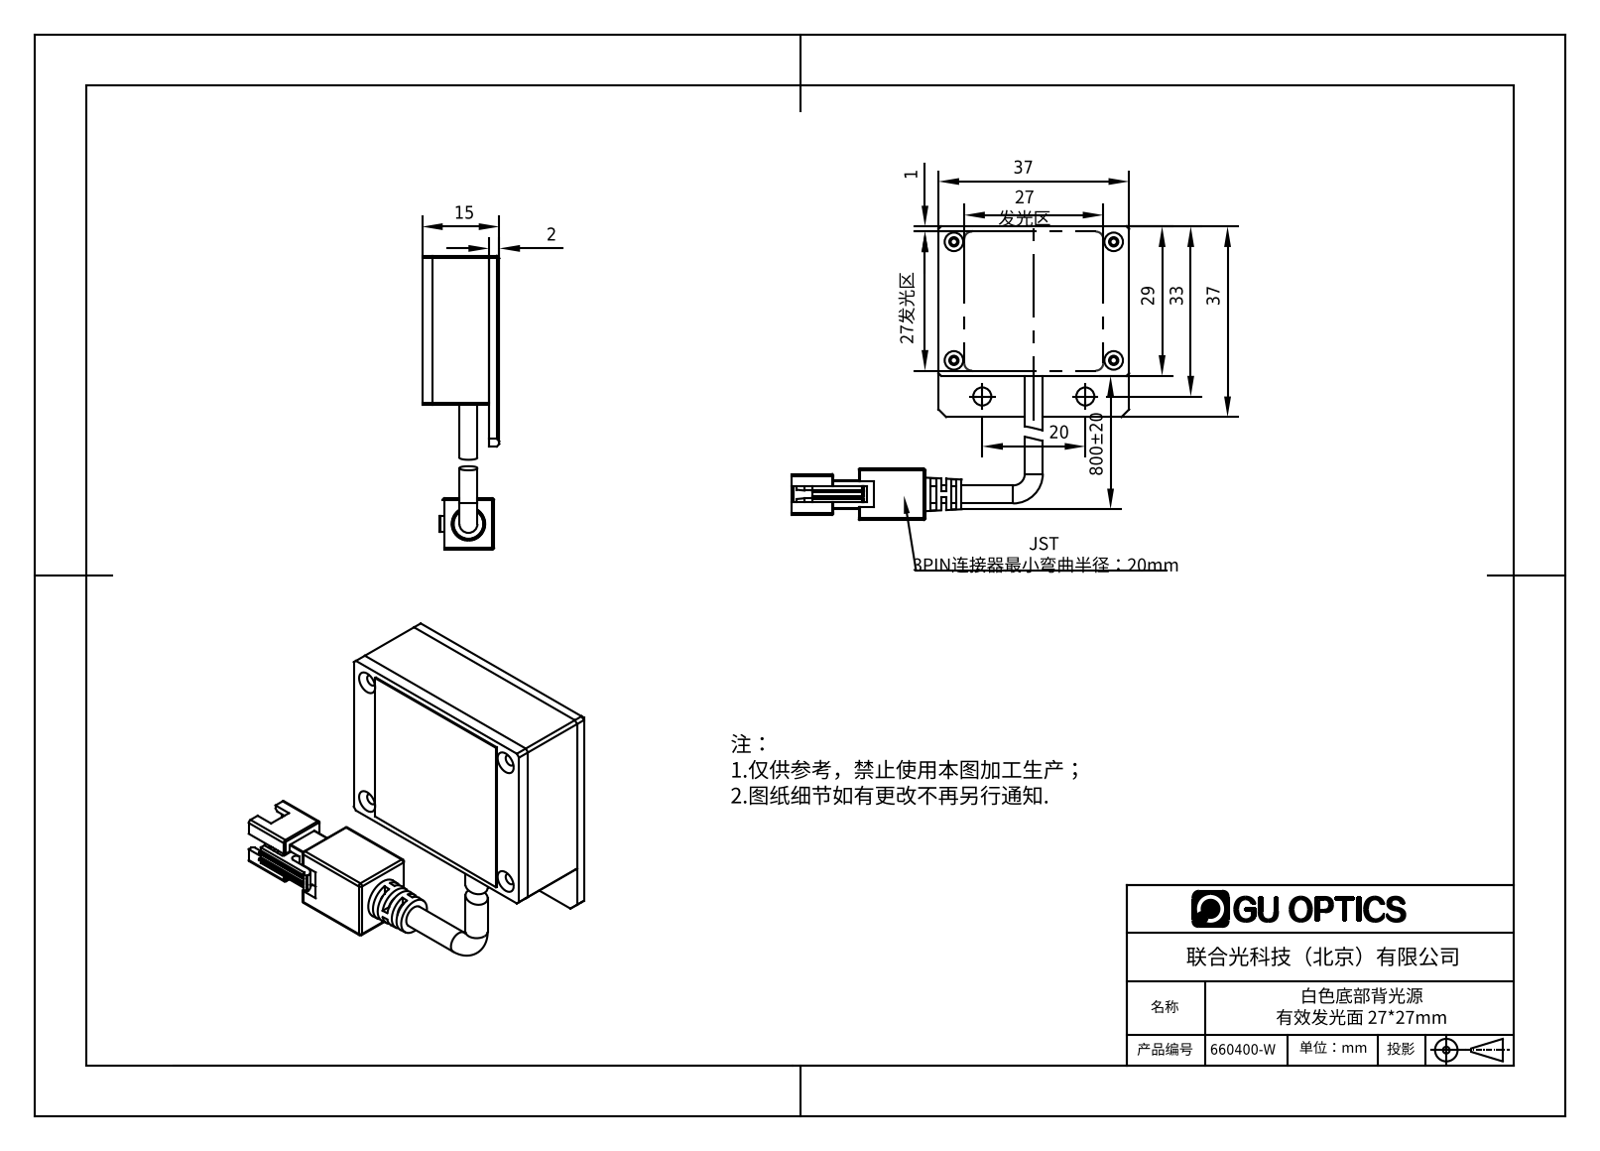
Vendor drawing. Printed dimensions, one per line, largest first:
800±20
37
37
33
29
27 发光区
27发光区
20
15
2
1
